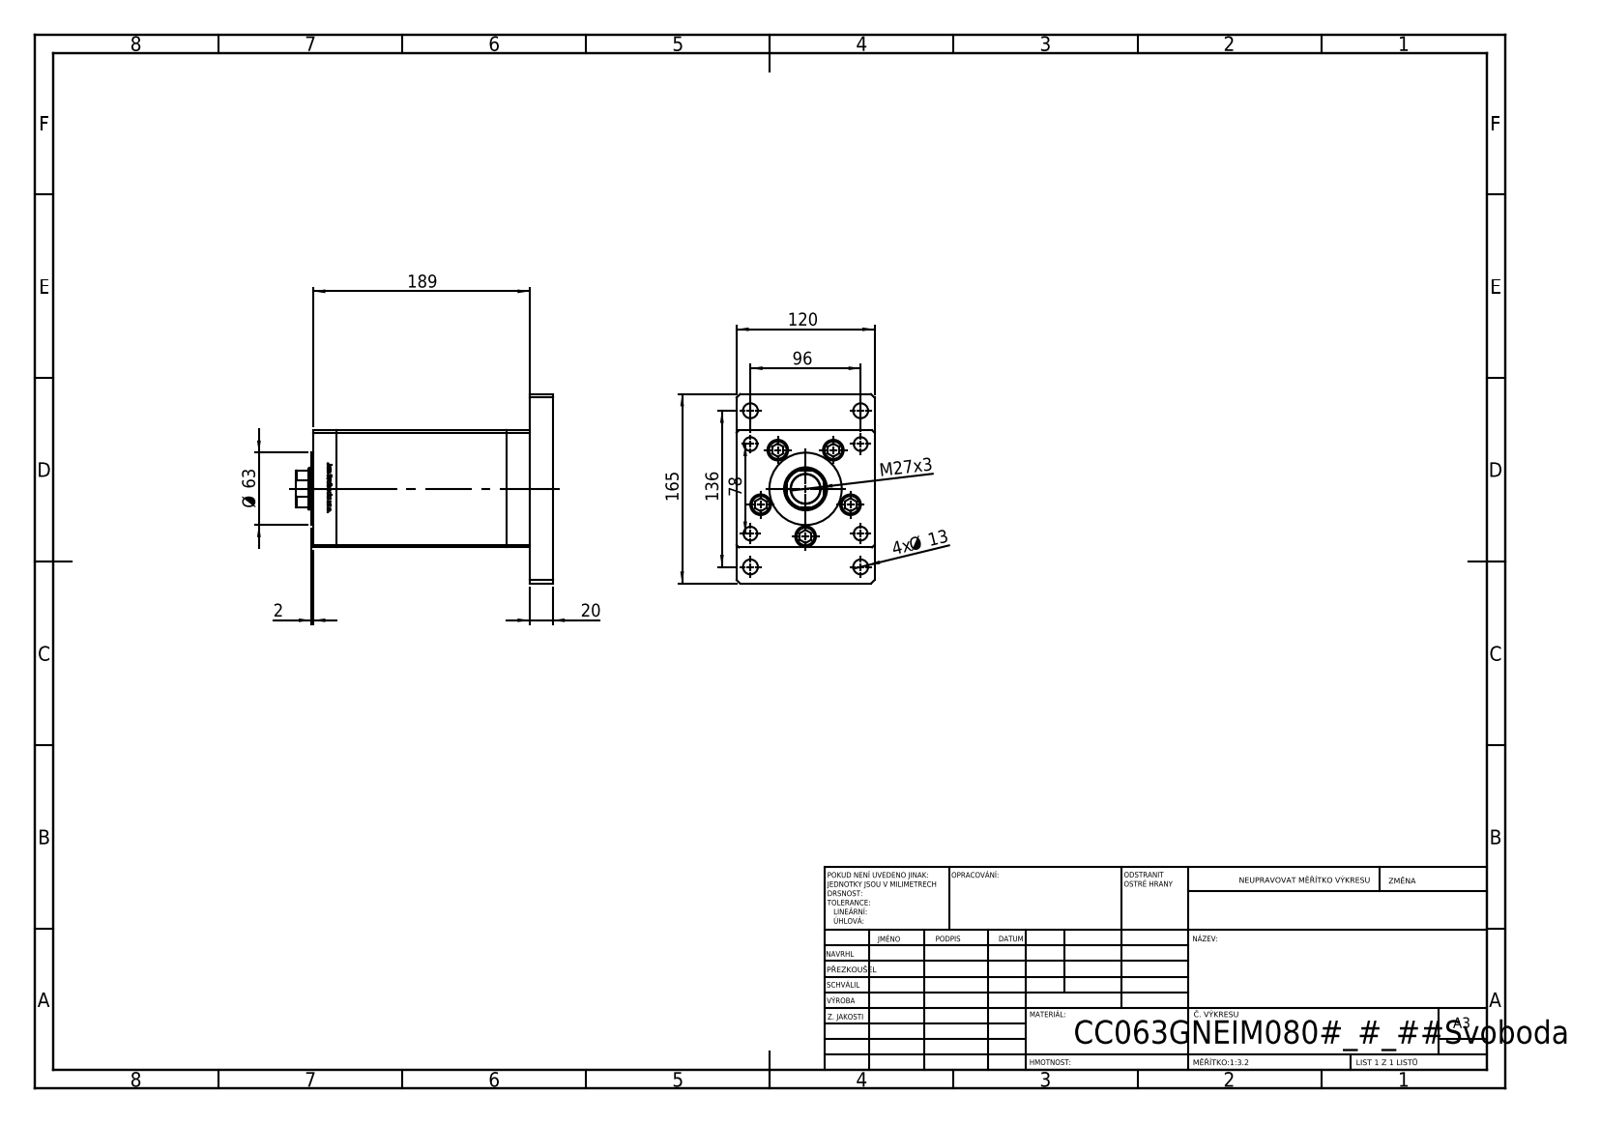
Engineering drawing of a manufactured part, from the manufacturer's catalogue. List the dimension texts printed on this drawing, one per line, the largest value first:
189
165
136
120
96
78
Ø 63
M27x3
20
4x Ø 13
2
